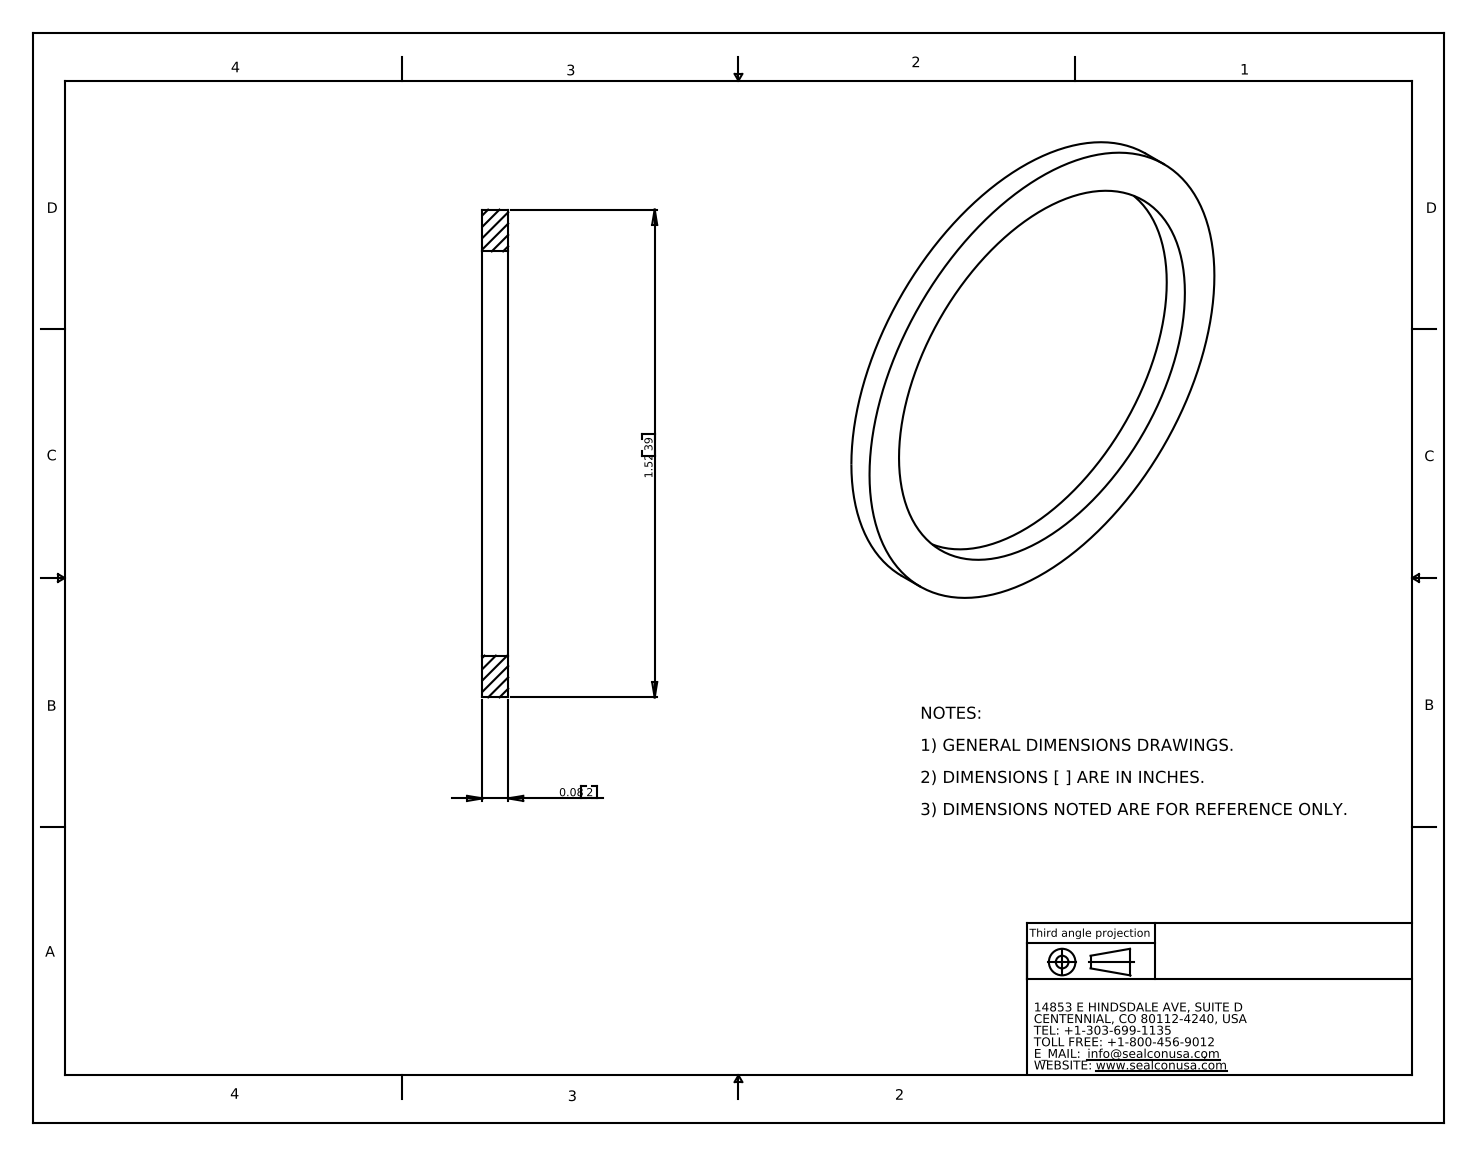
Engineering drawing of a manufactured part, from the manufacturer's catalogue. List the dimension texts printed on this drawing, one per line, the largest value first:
1.52 39
0.08 2
